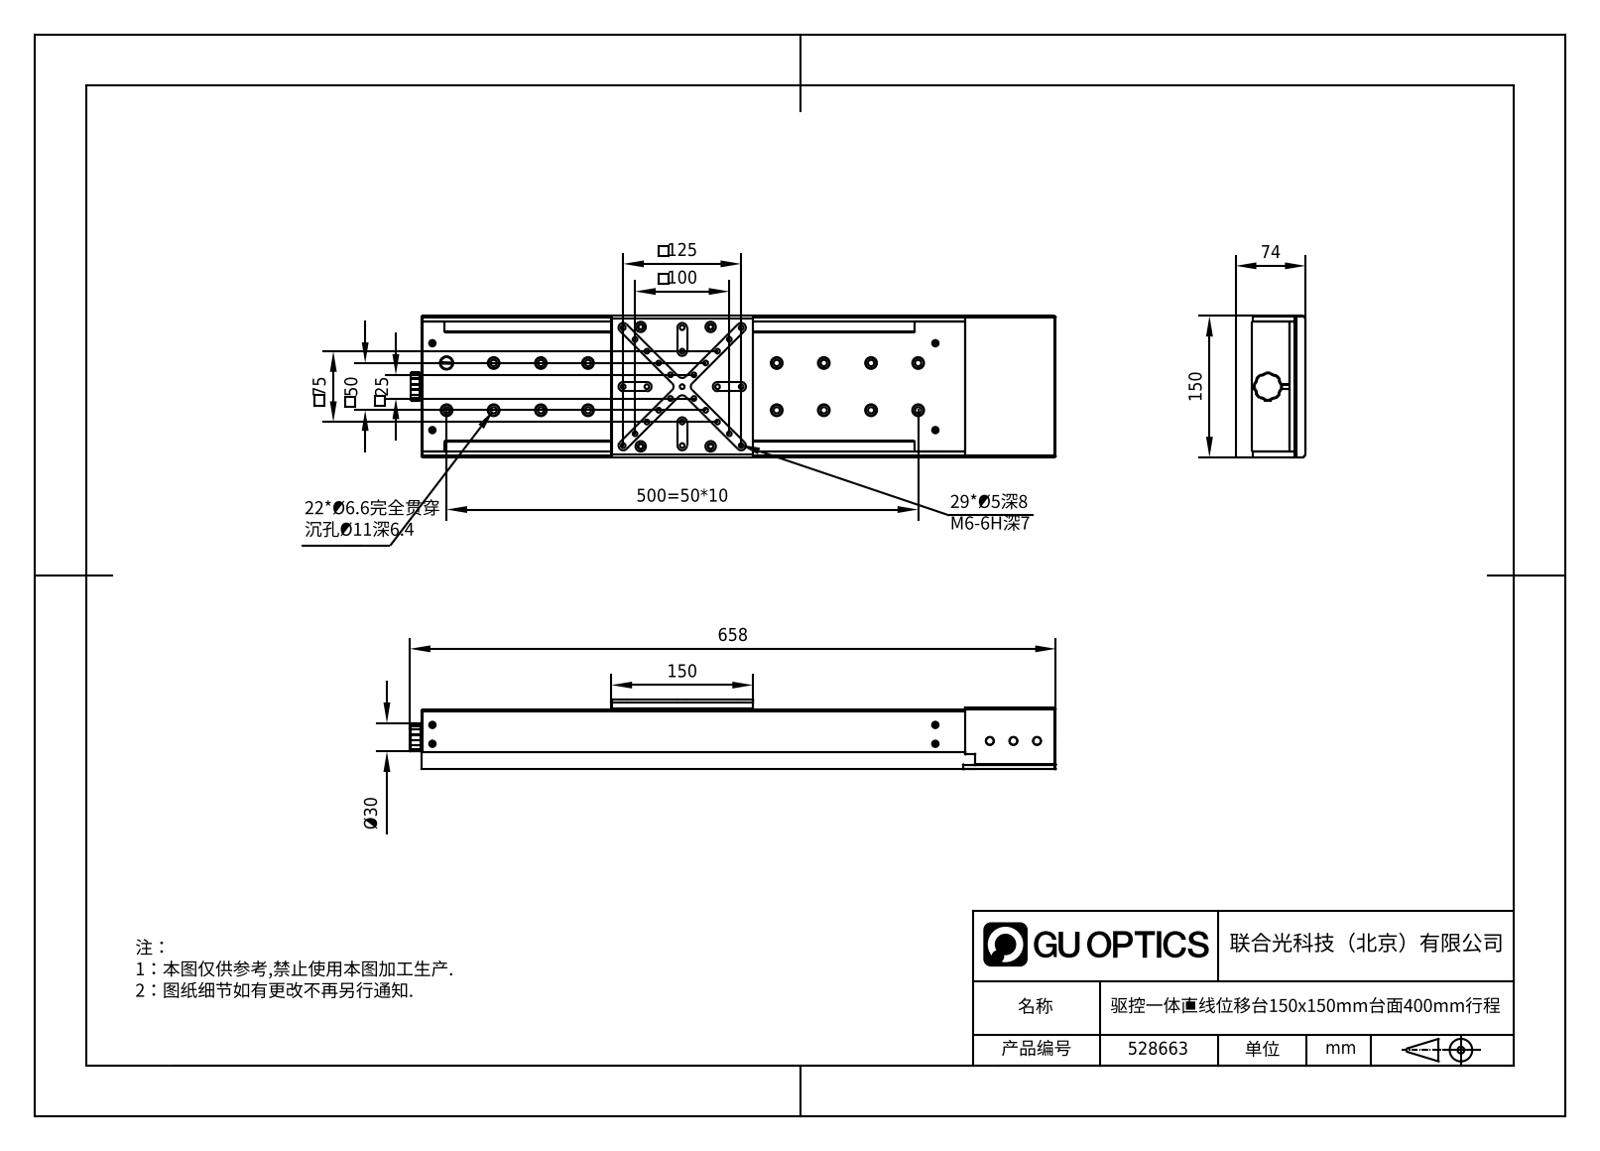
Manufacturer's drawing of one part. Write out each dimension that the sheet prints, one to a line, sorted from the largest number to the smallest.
658
500=50*10
150
150
125
100
75
74
50
Ø30
25
